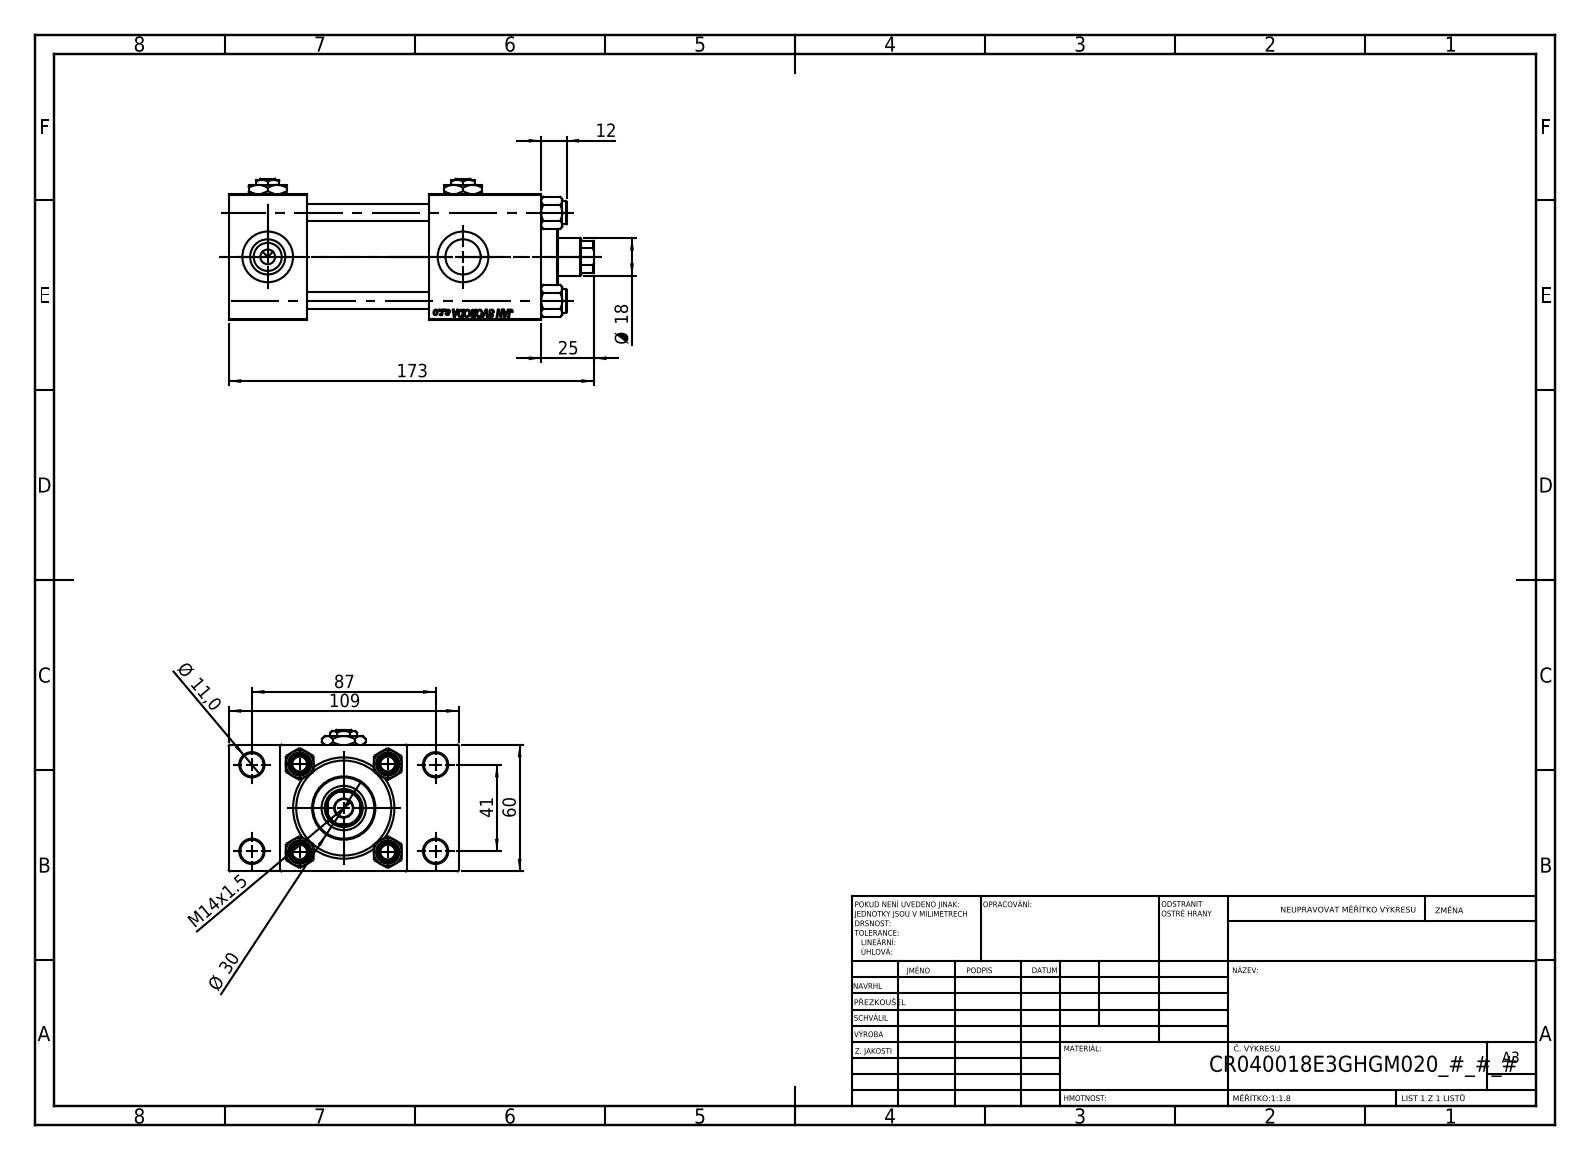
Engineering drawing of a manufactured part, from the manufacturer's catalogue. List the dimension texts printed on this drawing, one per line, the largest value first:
173
109
87
60
41
Ø 30
25
Ø 18
M14x1.5
12
Ø 11,0
